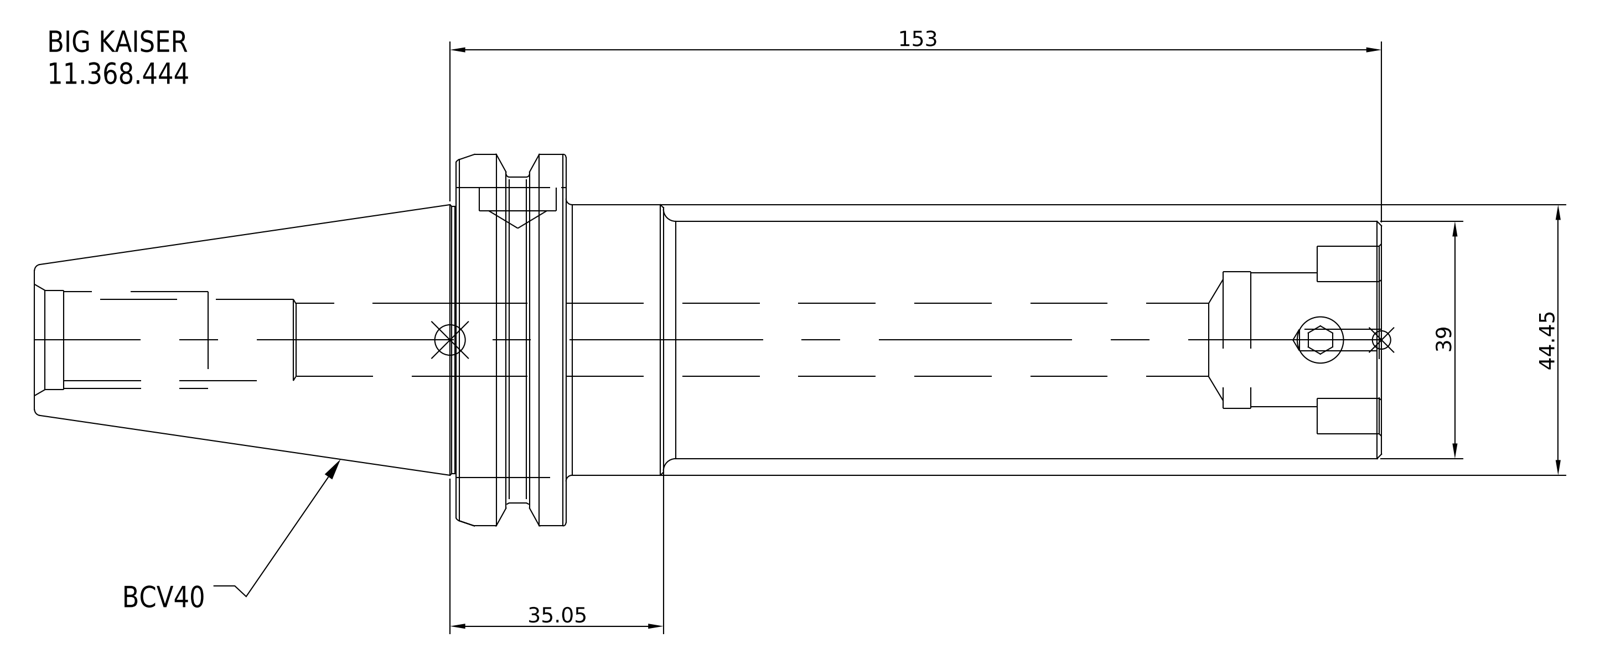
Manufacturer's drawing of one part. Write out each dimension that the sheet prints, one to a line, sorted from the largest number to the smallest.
153
44.45
39
35.05
